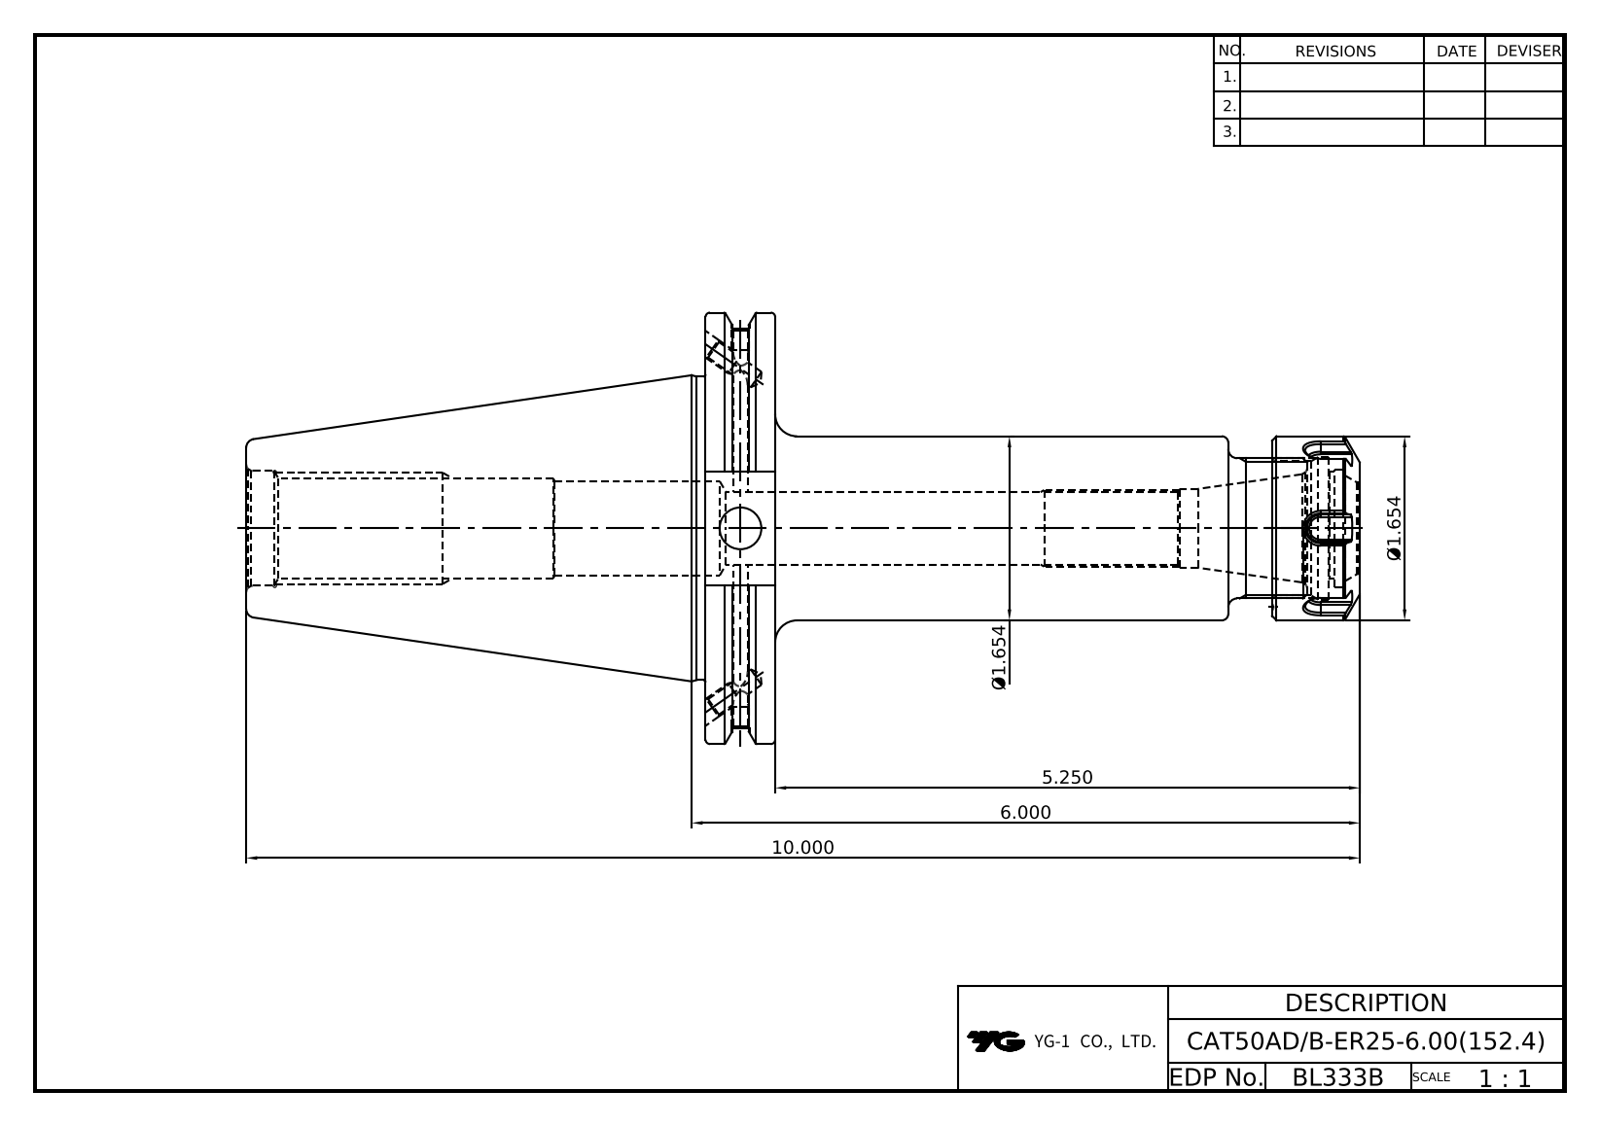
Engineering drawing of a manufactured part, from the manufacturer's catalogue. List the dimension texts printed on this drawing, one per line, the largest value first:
10.000
6.000
5.250
Ø1.654
Ø1.654
